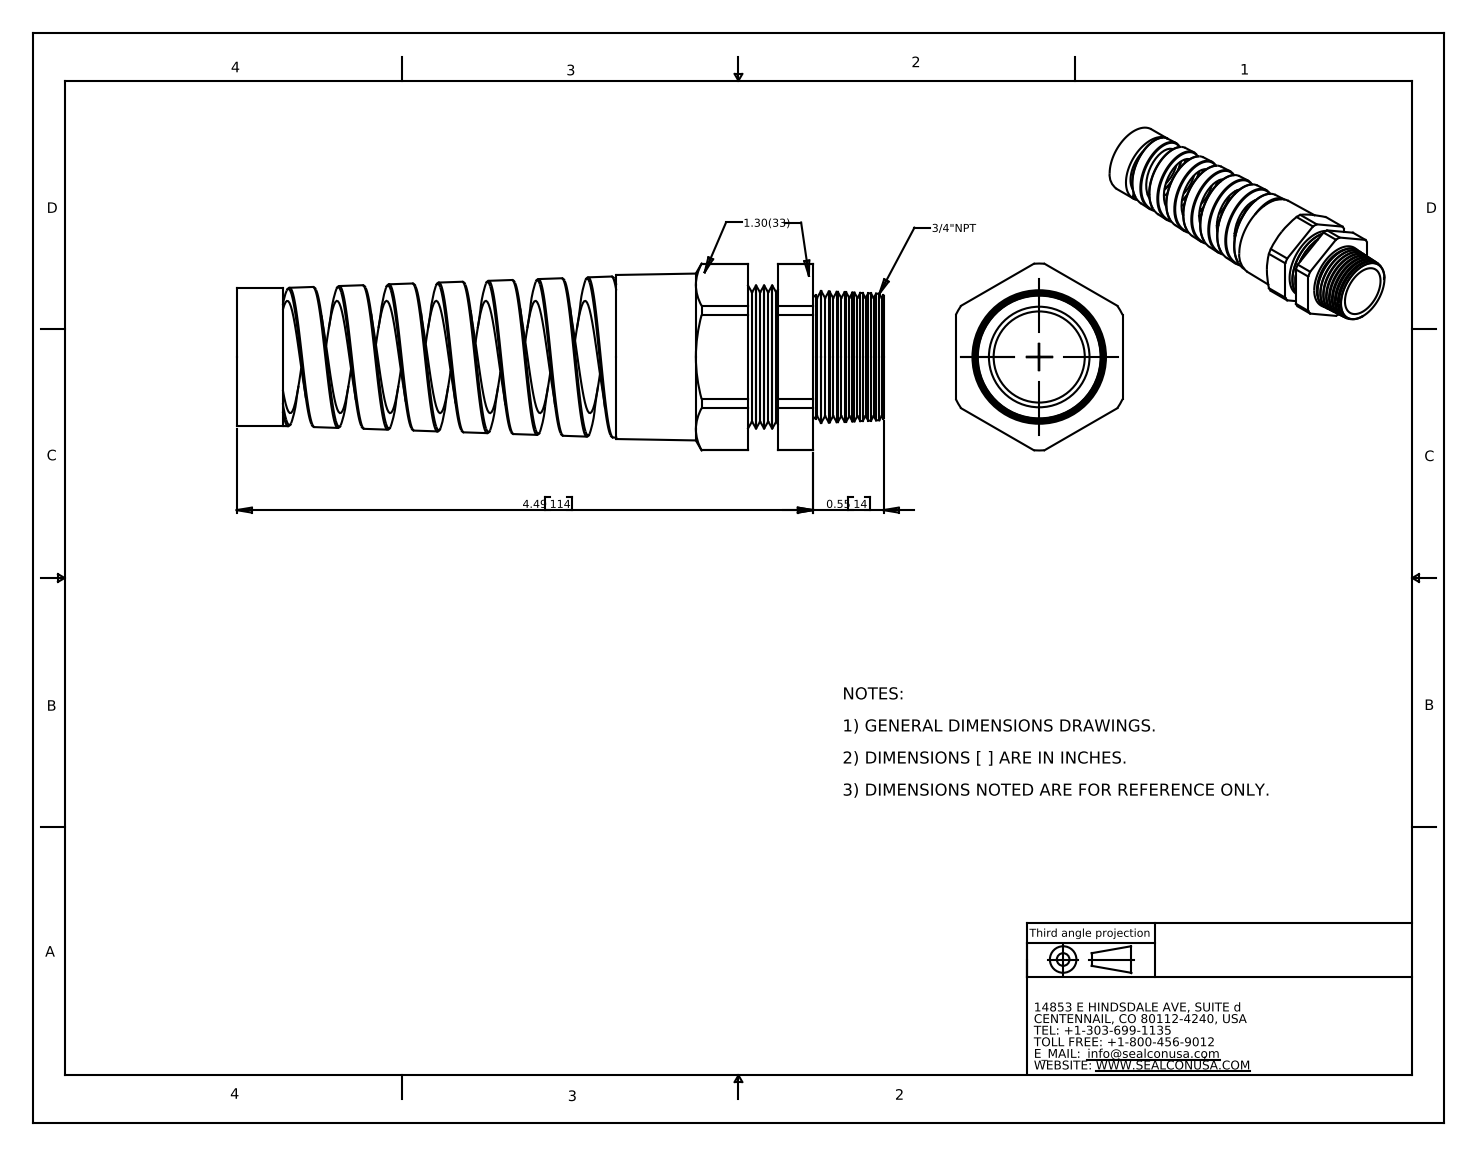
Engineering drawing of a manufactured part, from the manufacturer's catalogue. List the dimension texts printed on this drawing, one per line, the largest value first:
4.49 114
0.55 14
